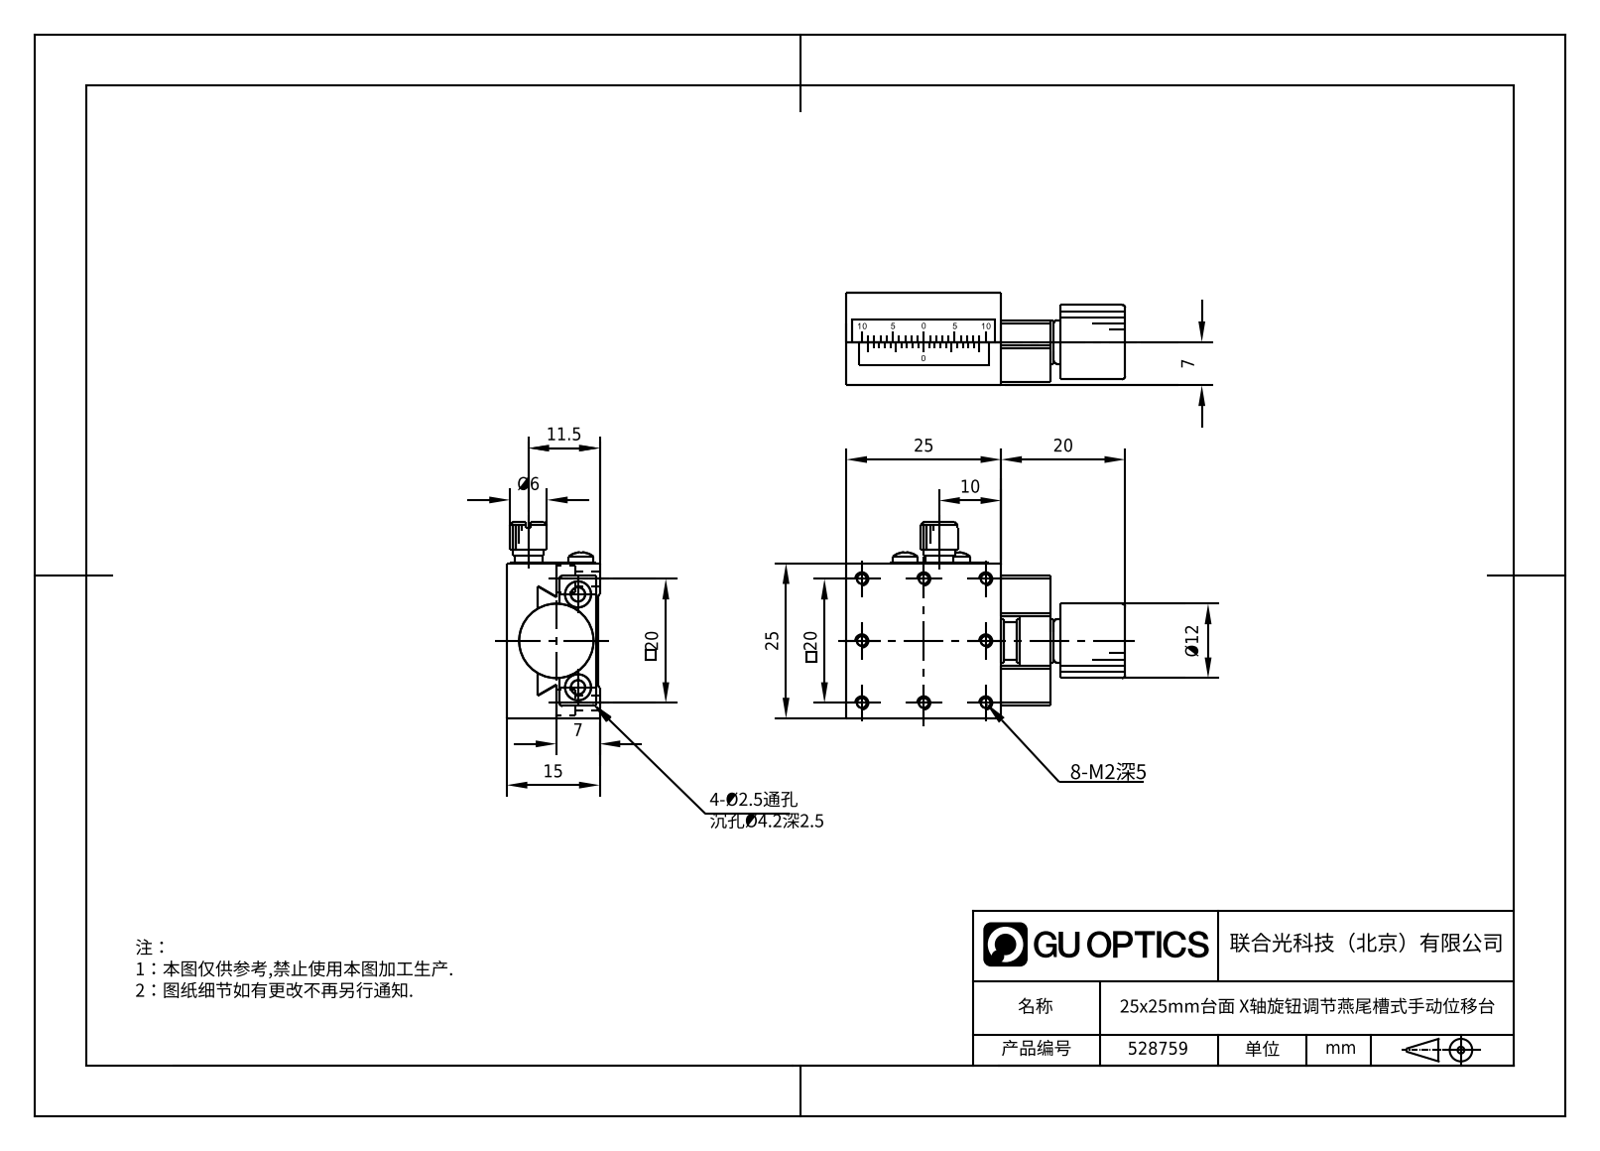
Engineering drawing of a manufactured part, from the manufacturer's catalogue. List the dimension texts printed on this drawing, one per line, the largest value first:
25
25
20
20
20
15
Ø12
11.5
10
7
7
Ø6
